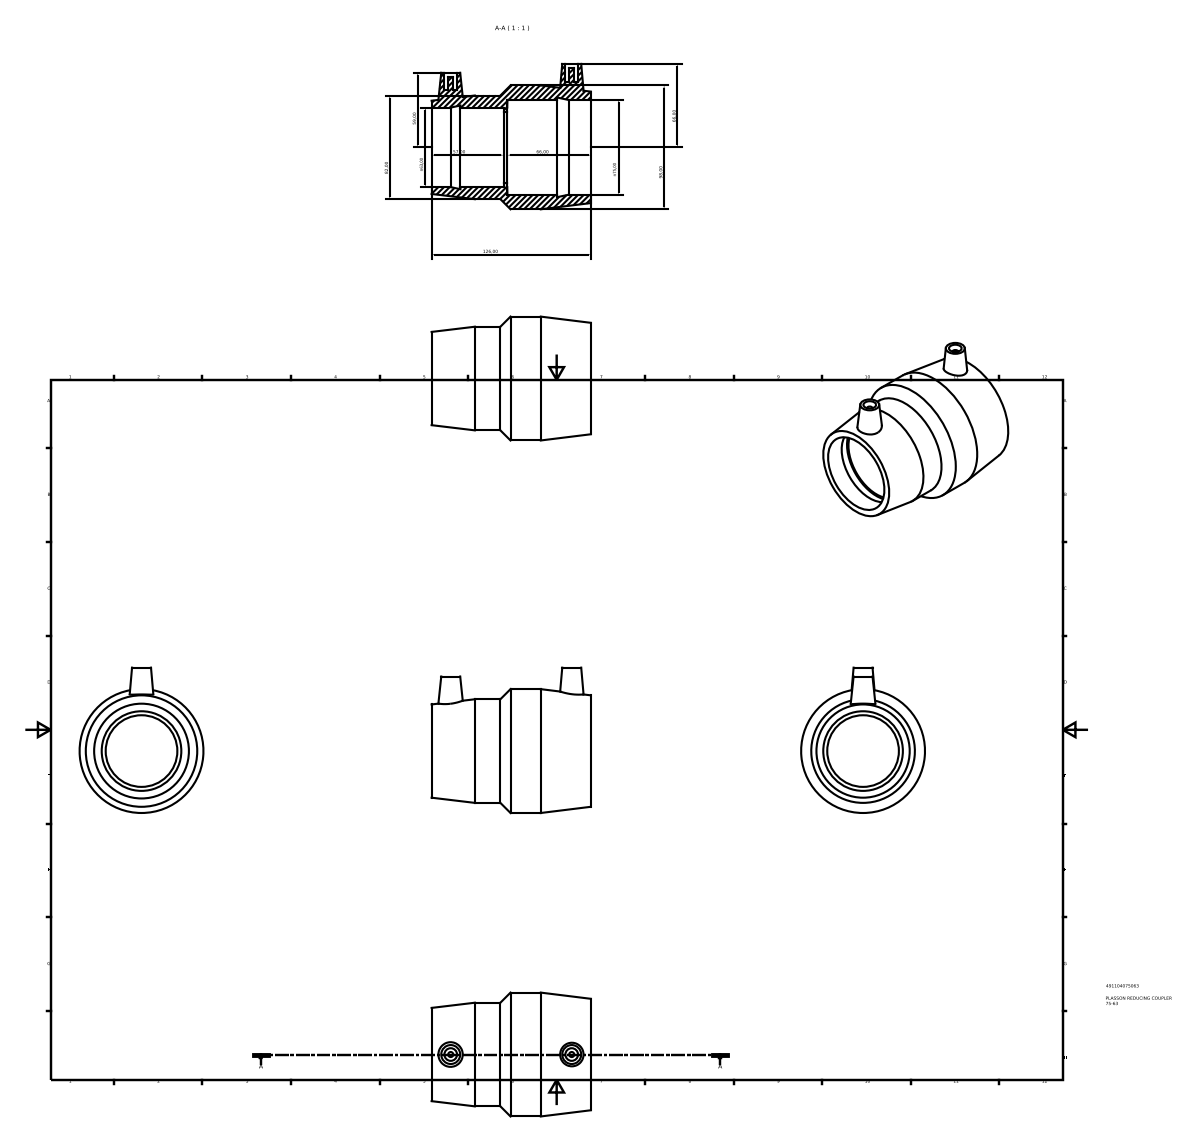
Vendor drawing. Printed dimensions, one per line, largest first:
126,00
98,00
82,00
n75,00
66,00
66,00
n63,00
59,00
57,00
